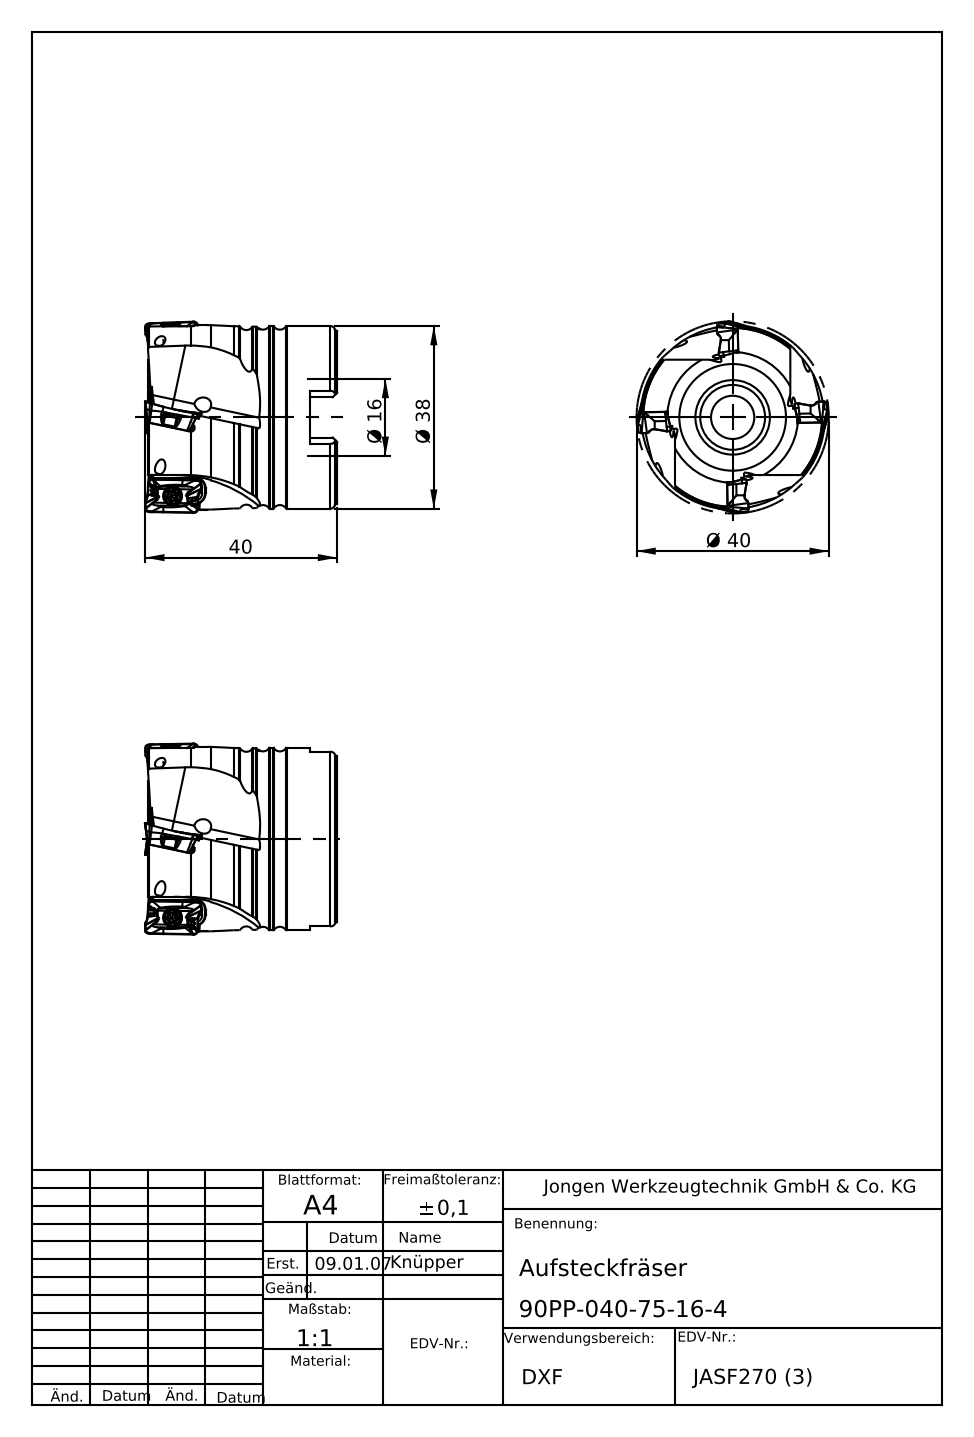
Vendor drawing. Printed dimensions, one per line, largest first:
40
Ø 40
Ø 38
Ø 16
